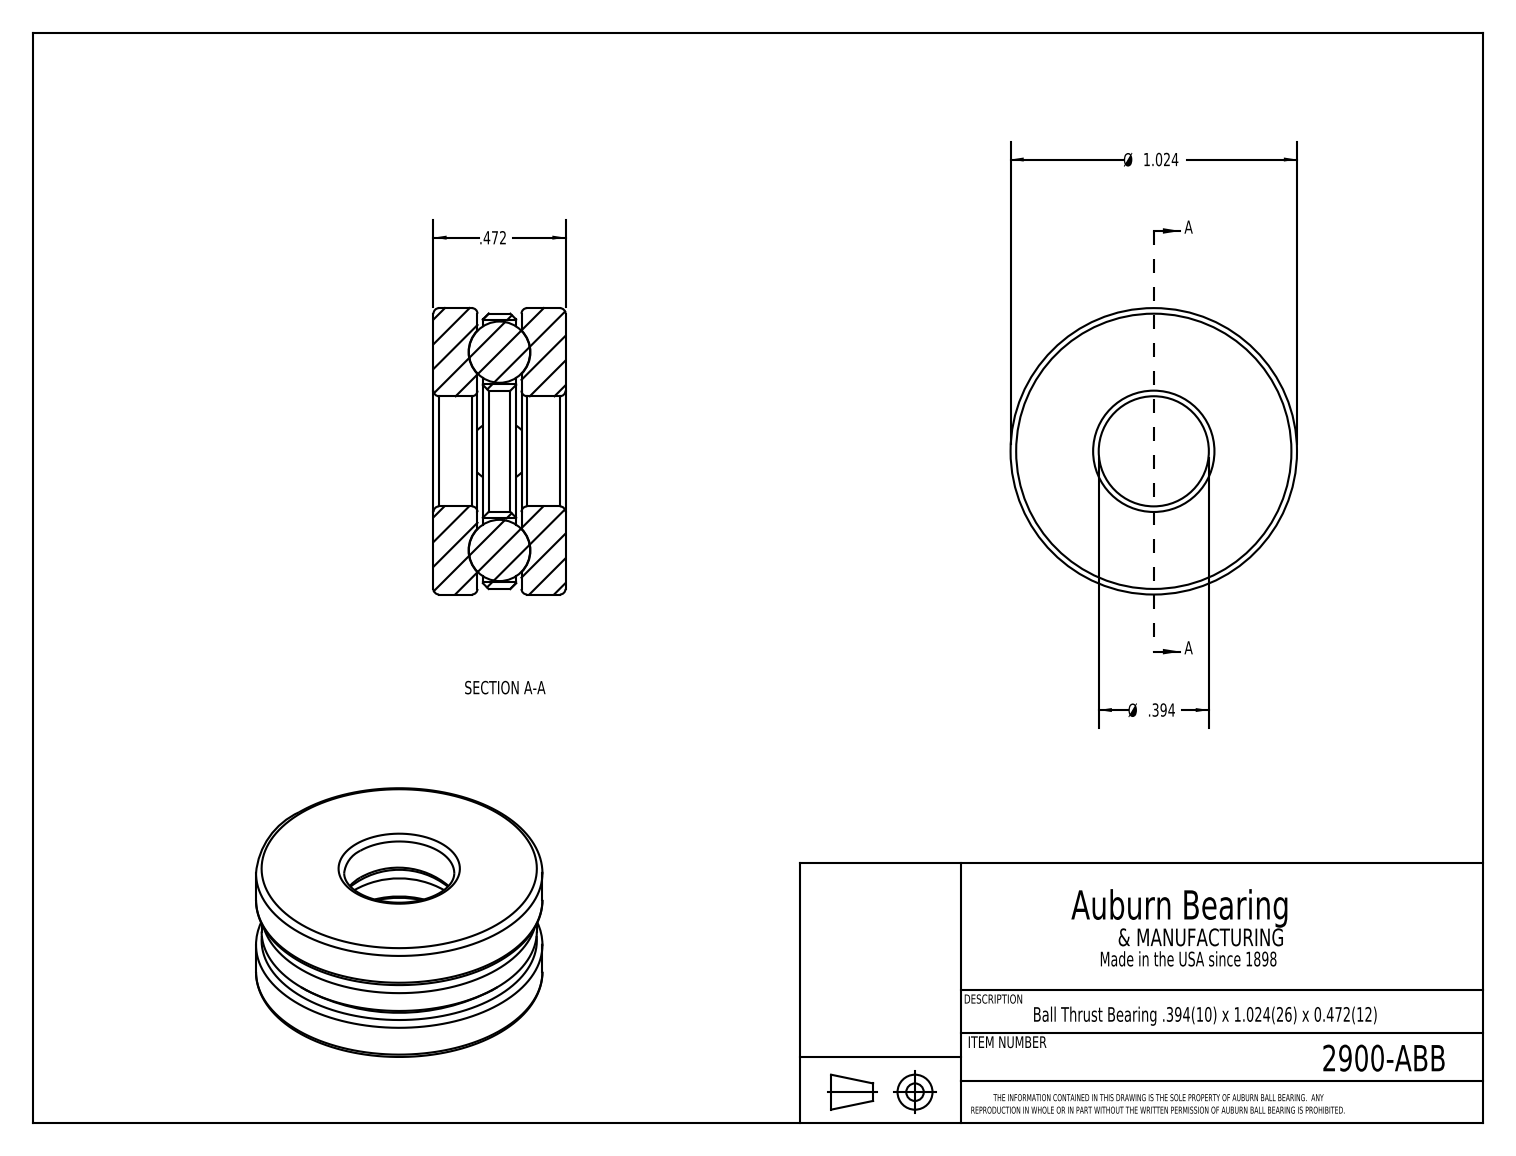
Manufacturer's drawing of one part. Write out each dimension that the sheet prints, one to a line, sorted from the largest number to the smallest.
Ø 1.024
.472
Ø .394
